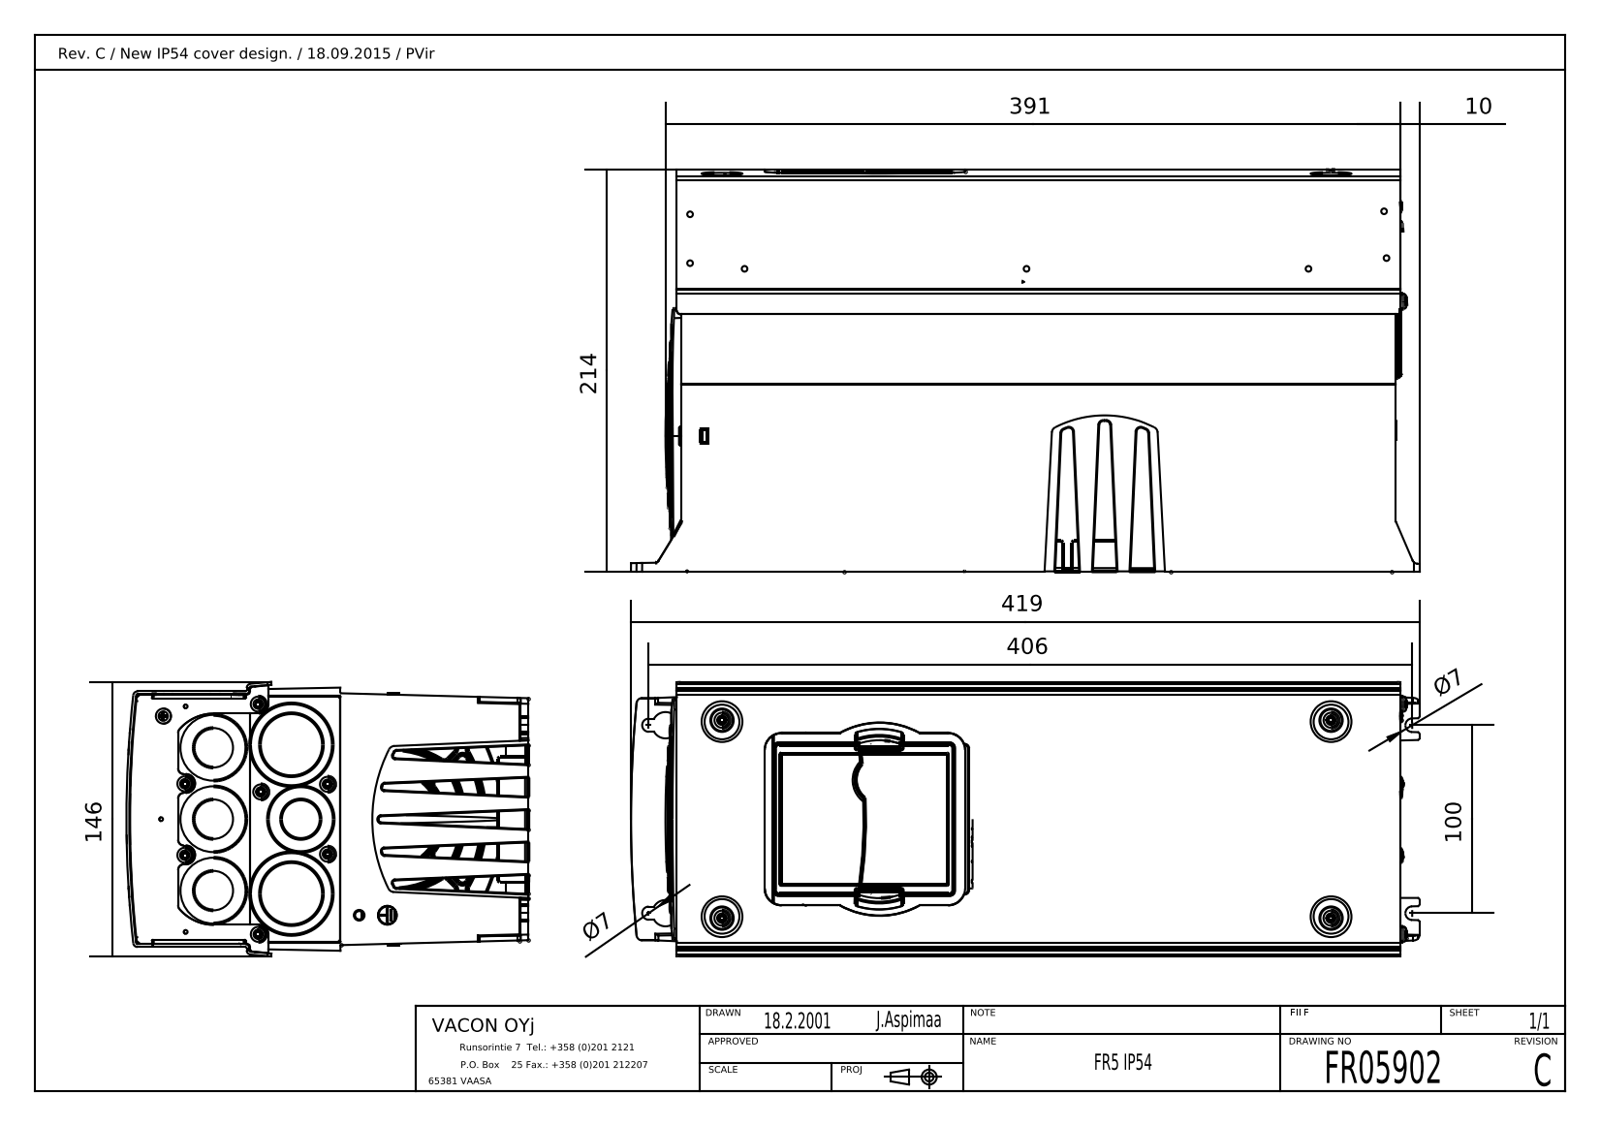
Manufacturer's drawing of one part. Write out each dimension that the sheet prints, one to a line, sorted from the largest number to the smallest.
419
406
391
214
146
100
10
Ø7
Ø7
